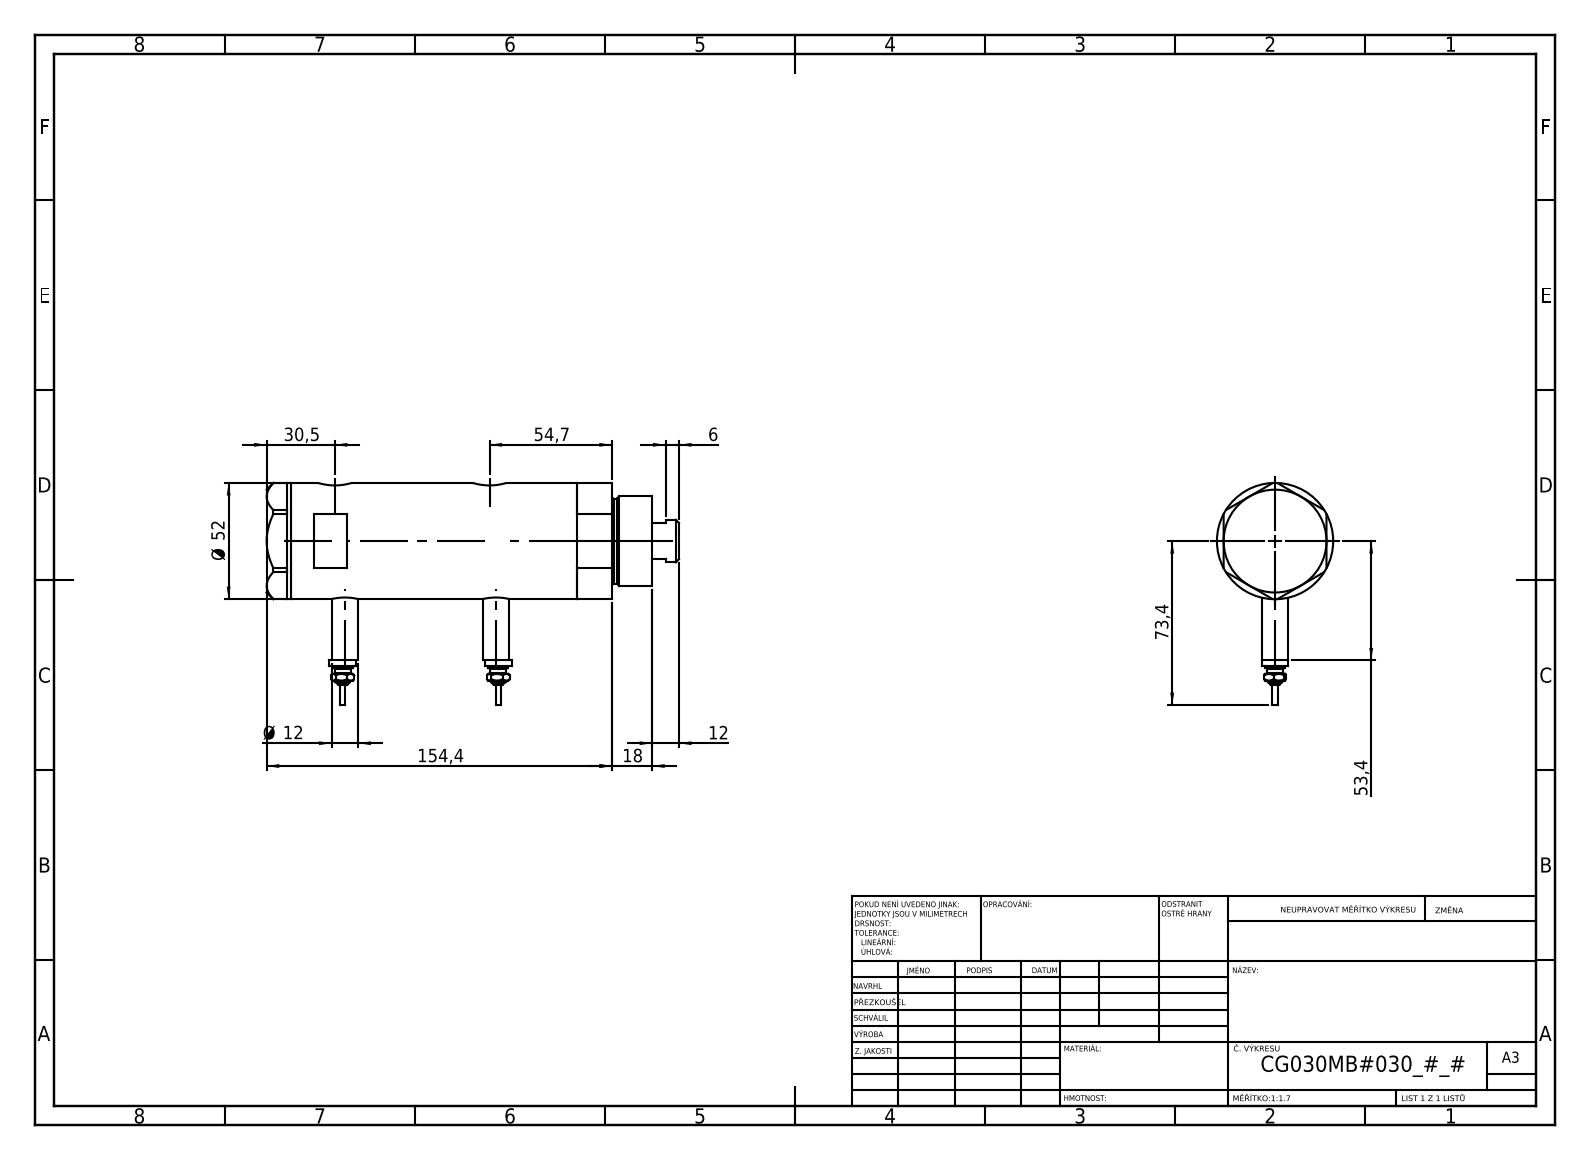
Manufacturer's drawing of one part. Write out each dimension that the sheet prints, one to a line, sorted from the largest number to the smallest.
154,4
73,4
54,7
53,4
Ø 52
30,5
18
12
Ø 12
6
